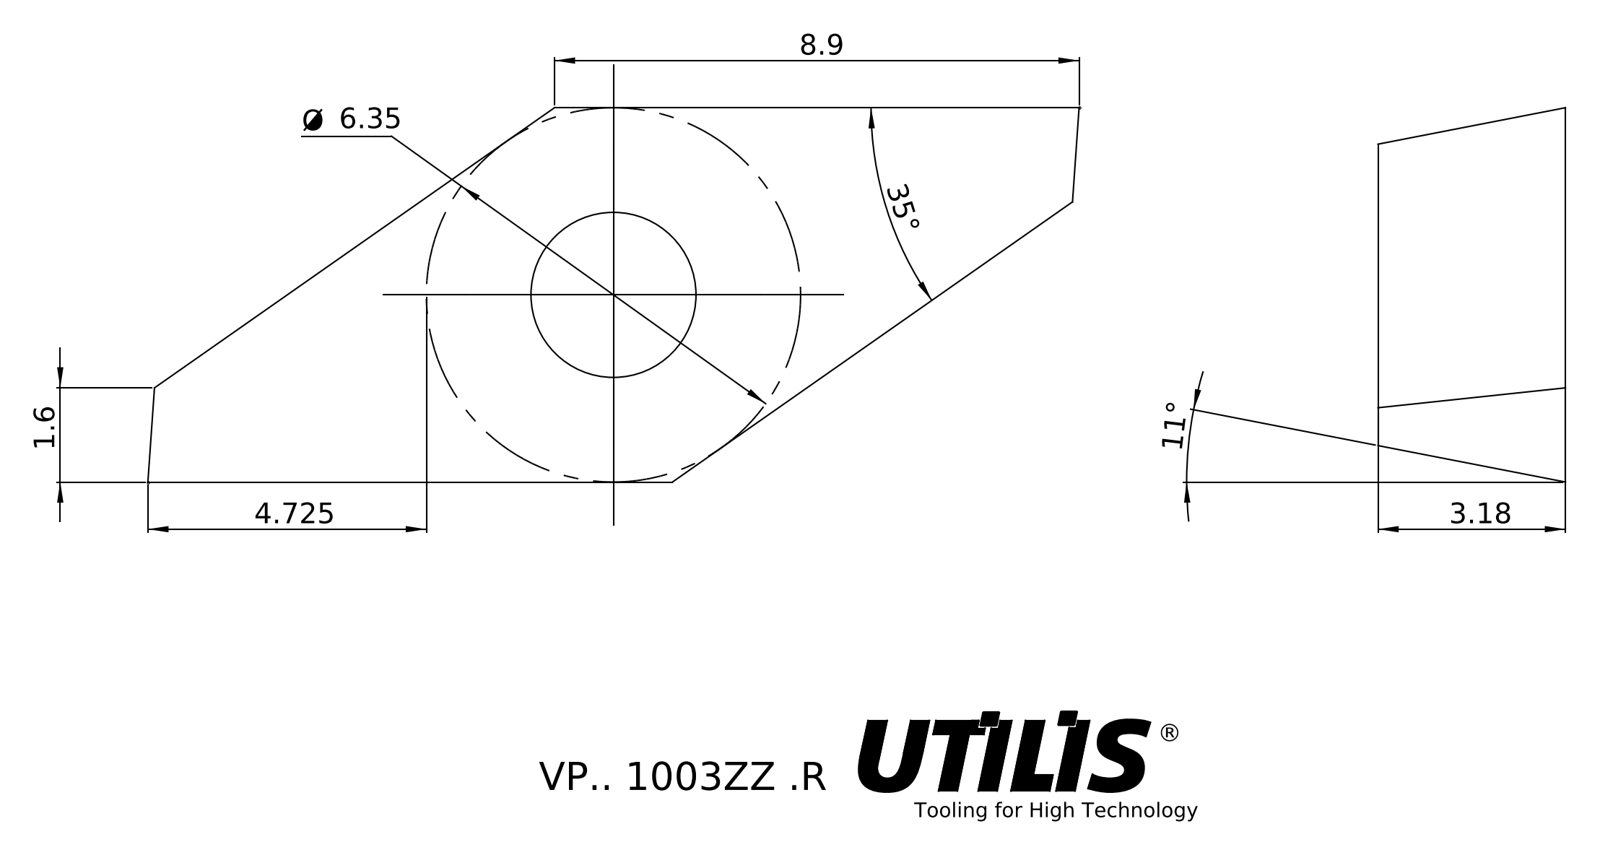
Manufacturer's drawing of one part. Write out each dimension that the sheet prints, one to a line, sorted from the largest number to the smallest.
35°
8.9
Ø 6.35
4.725
3.18
1.6
